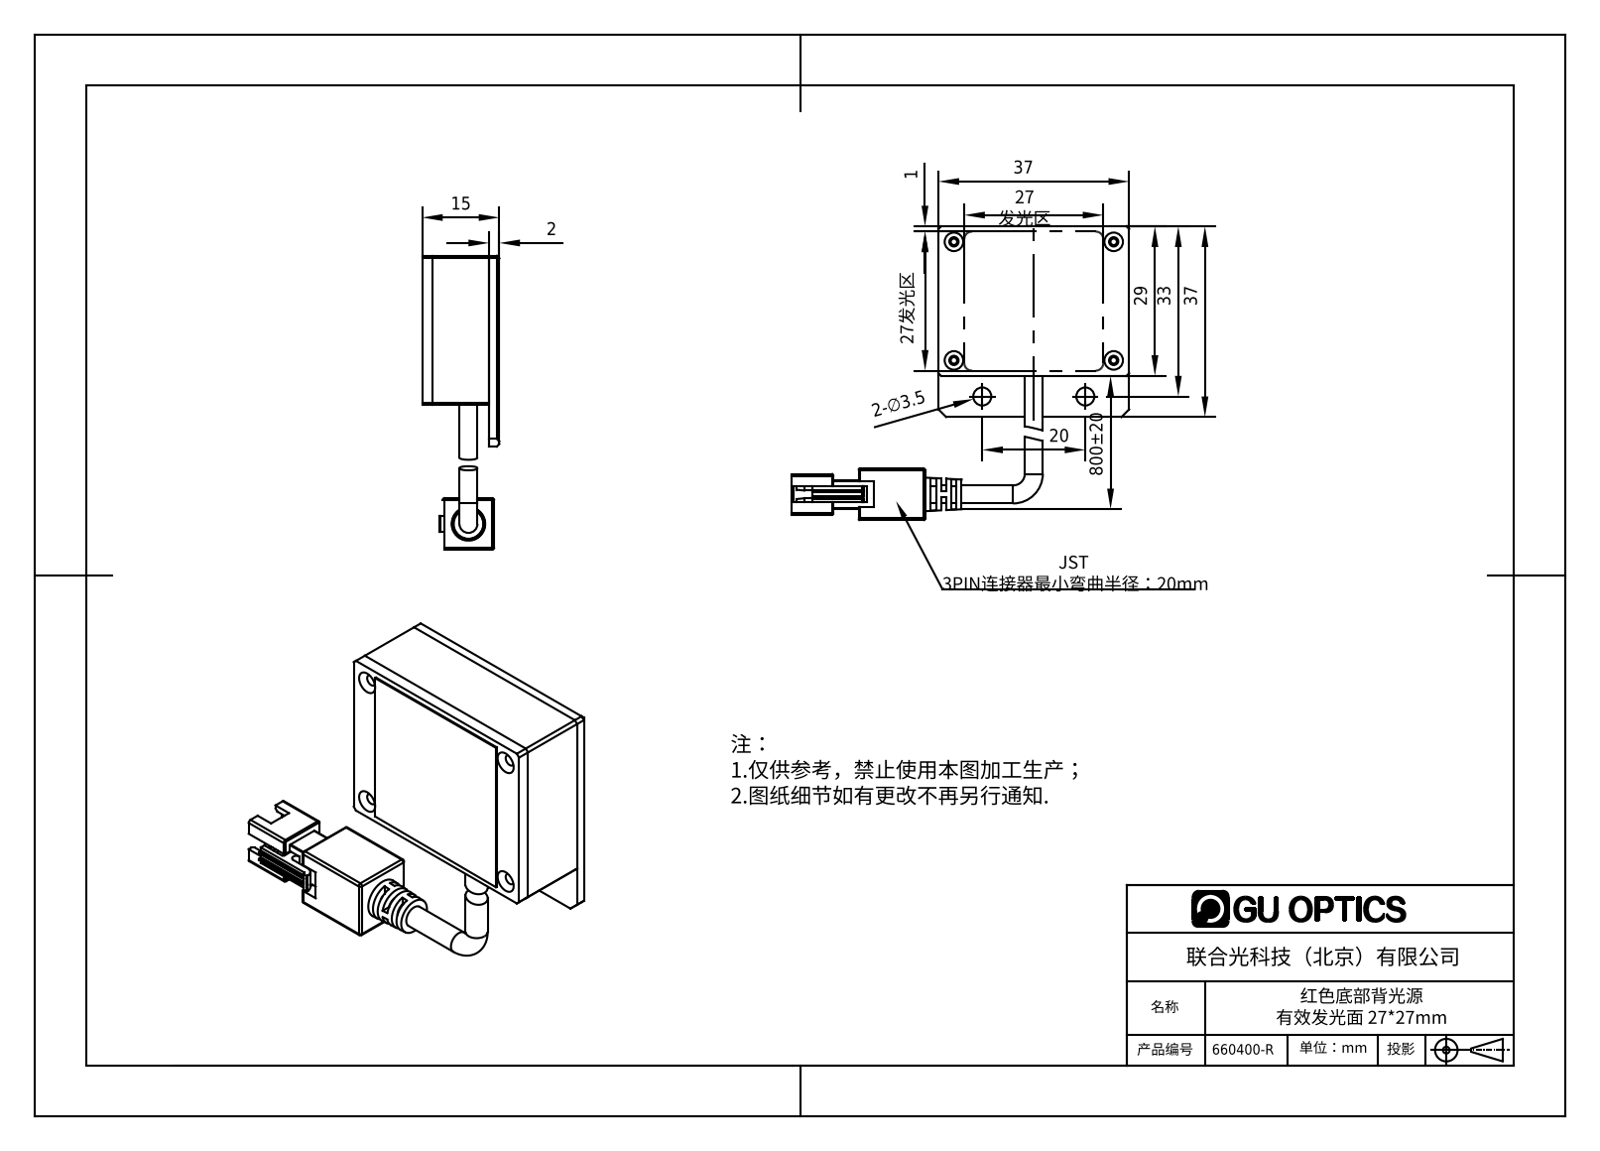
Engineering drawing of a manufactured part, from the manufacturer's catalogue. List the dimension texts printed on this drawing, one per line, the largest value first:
800±20
37
37
33
29
27 发光区
27发光区
20
15
2-∅3.5
2
1
